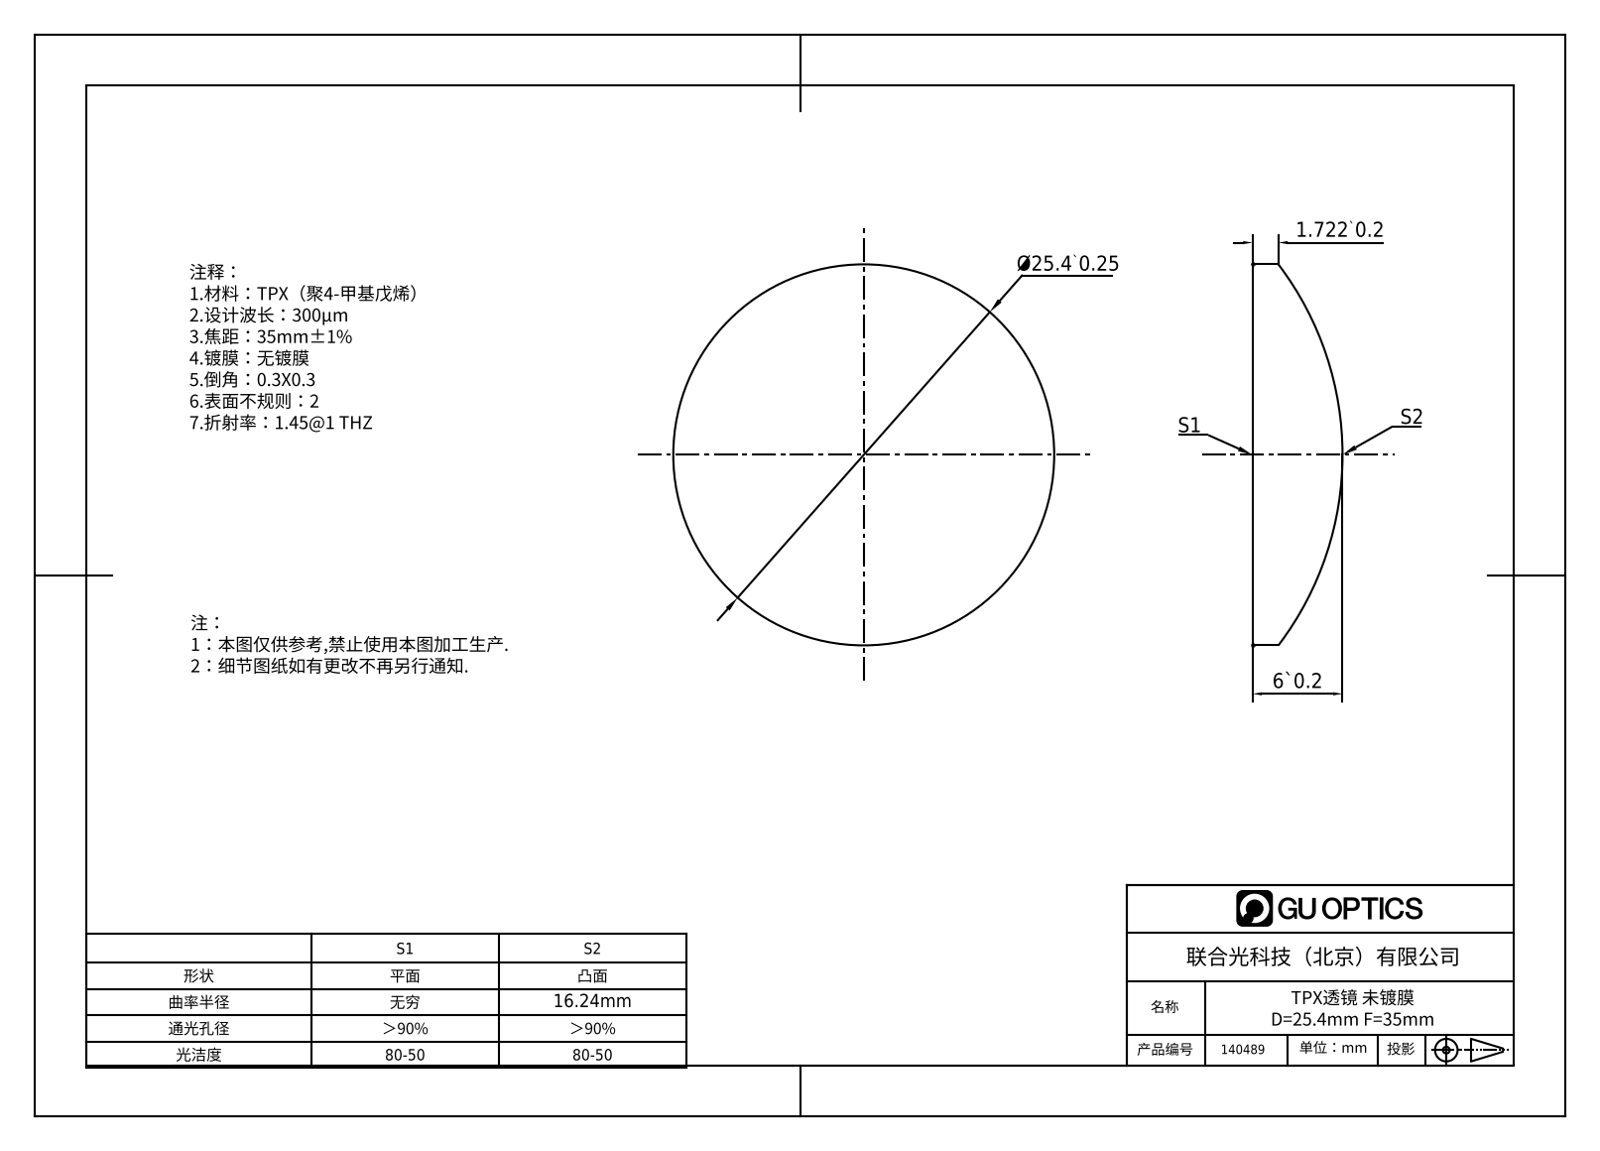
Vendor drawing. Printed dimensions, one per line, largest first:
Ø25.4`0.25
6`0.2
1.722`0.2
